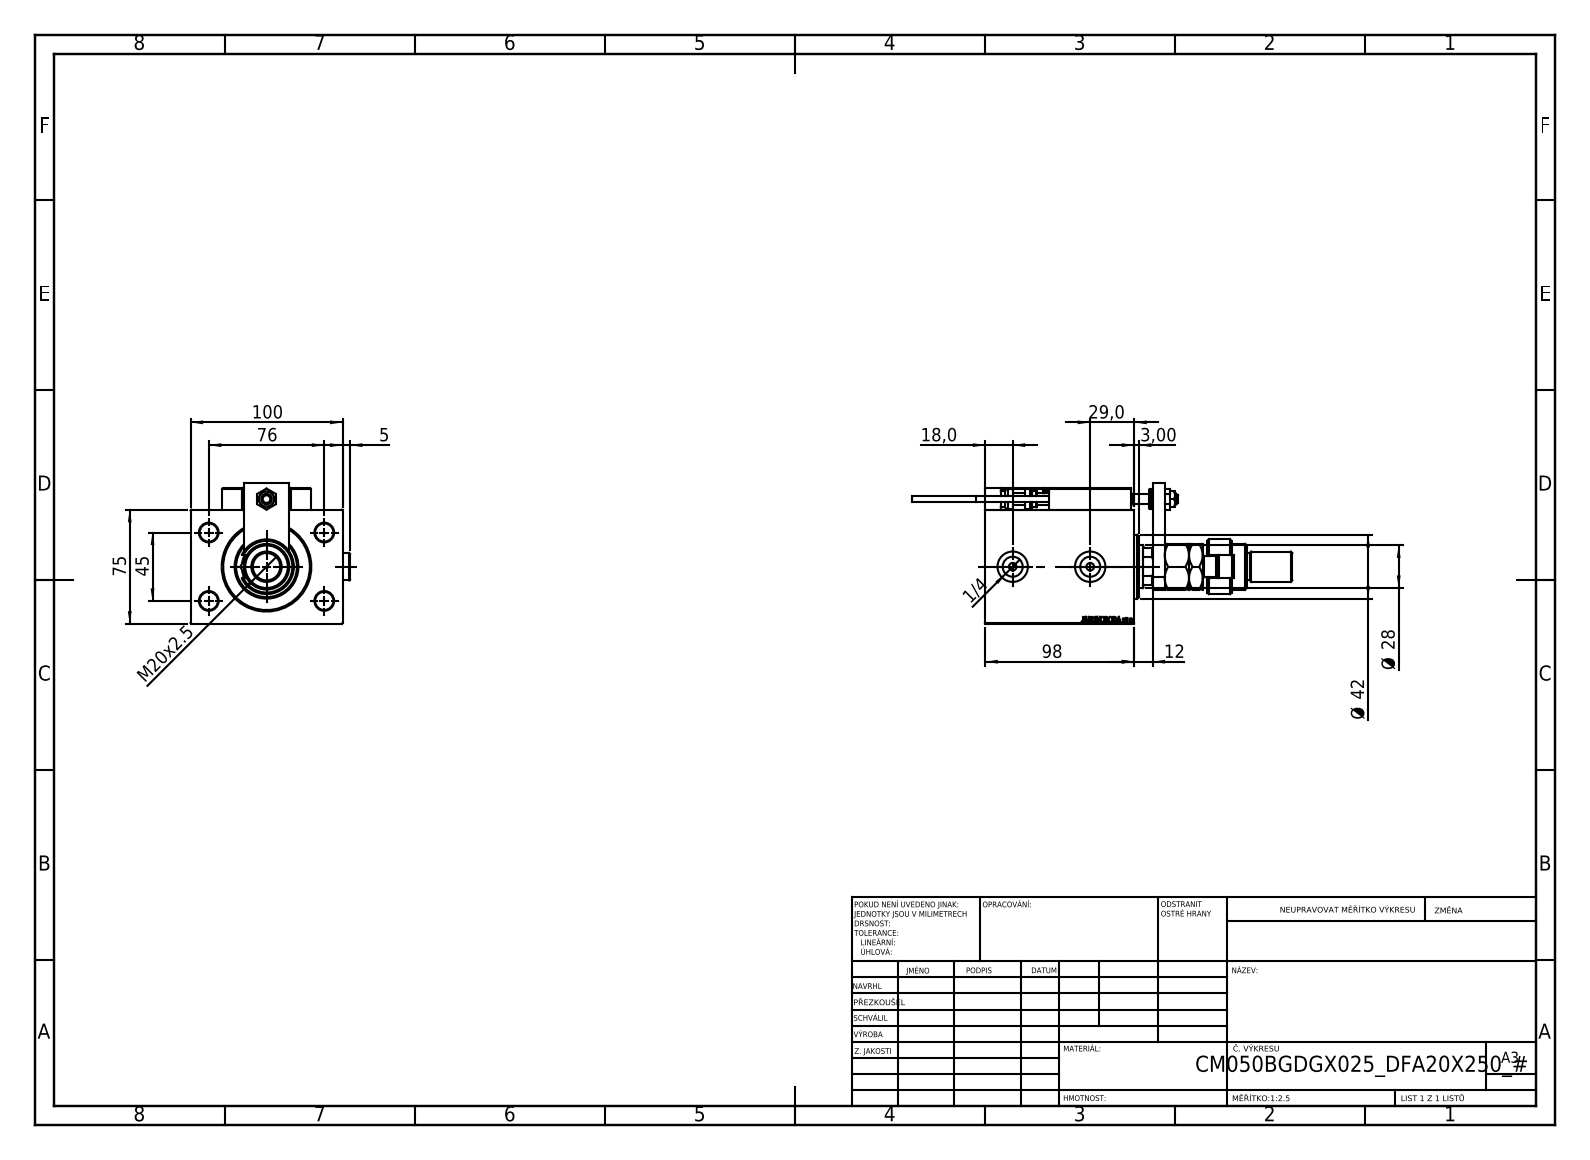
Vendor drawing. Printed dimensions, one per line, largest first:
100
98
76
75
45
Ø 42
29,0
Ø 28
M20x2.5
18,0
12
5
3,00
1/4
